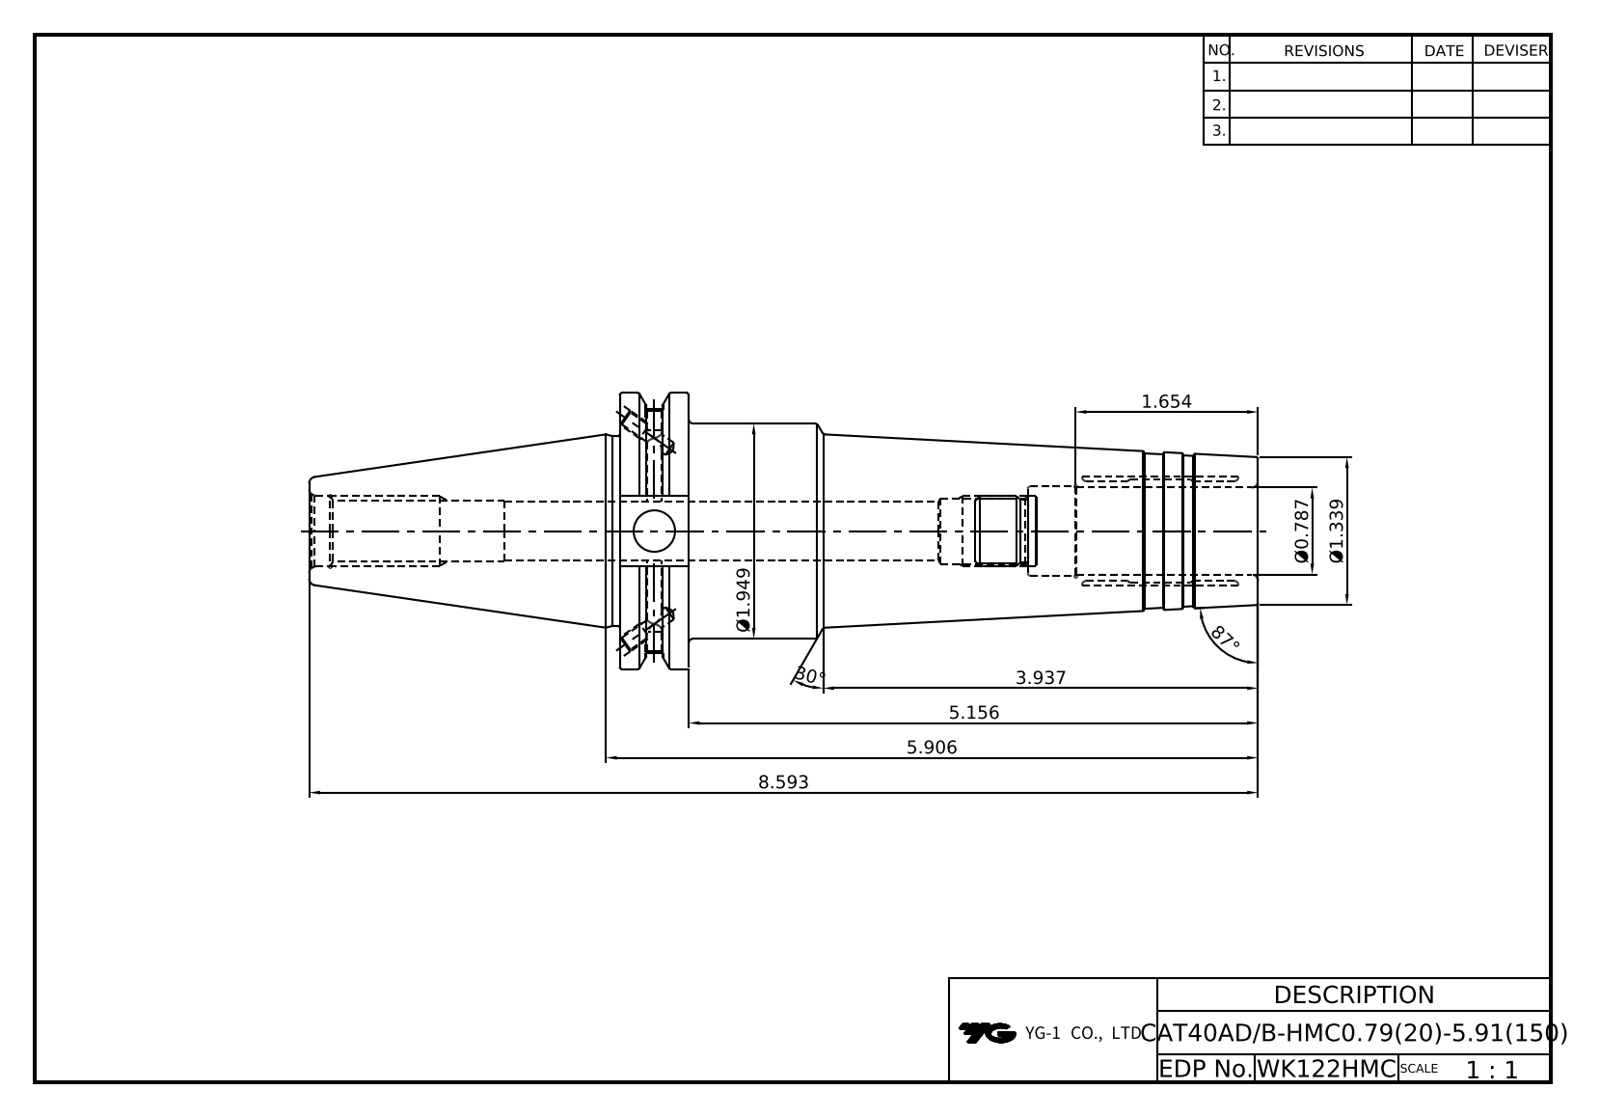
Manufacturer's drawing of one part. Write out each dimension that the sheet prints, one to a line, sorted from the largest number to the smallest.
87°
30°
8.593
5.906
5.156
3.937
Ø1.949
1.654
Ø1.339
Ø0.787
